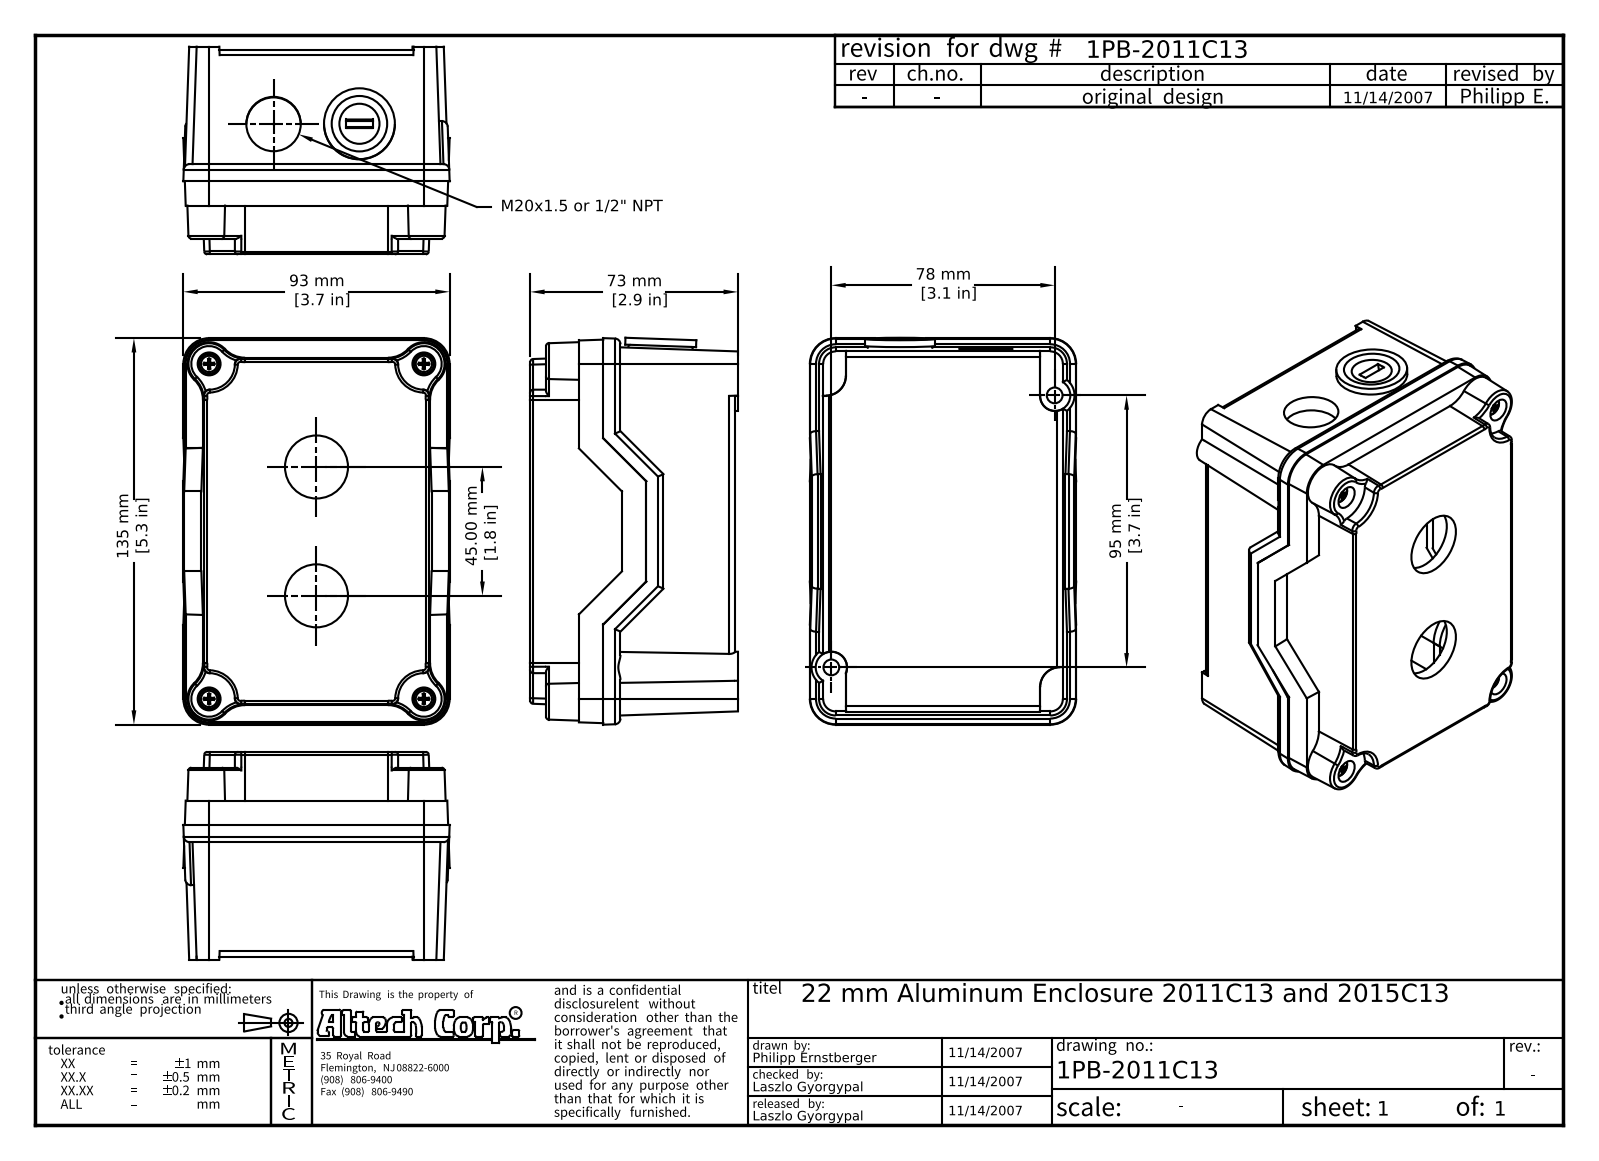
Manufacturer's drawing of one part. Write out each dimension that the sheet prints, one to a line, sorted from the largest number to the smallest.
135 mm [5.3 in]
95 mm [3.7 in]
93 mm [3.7 in]
78 mm [3.1 in]
73 mm [2.9 in]
45.00 mm [1.8 in]
M20x1.5 or 1/2" NPT
